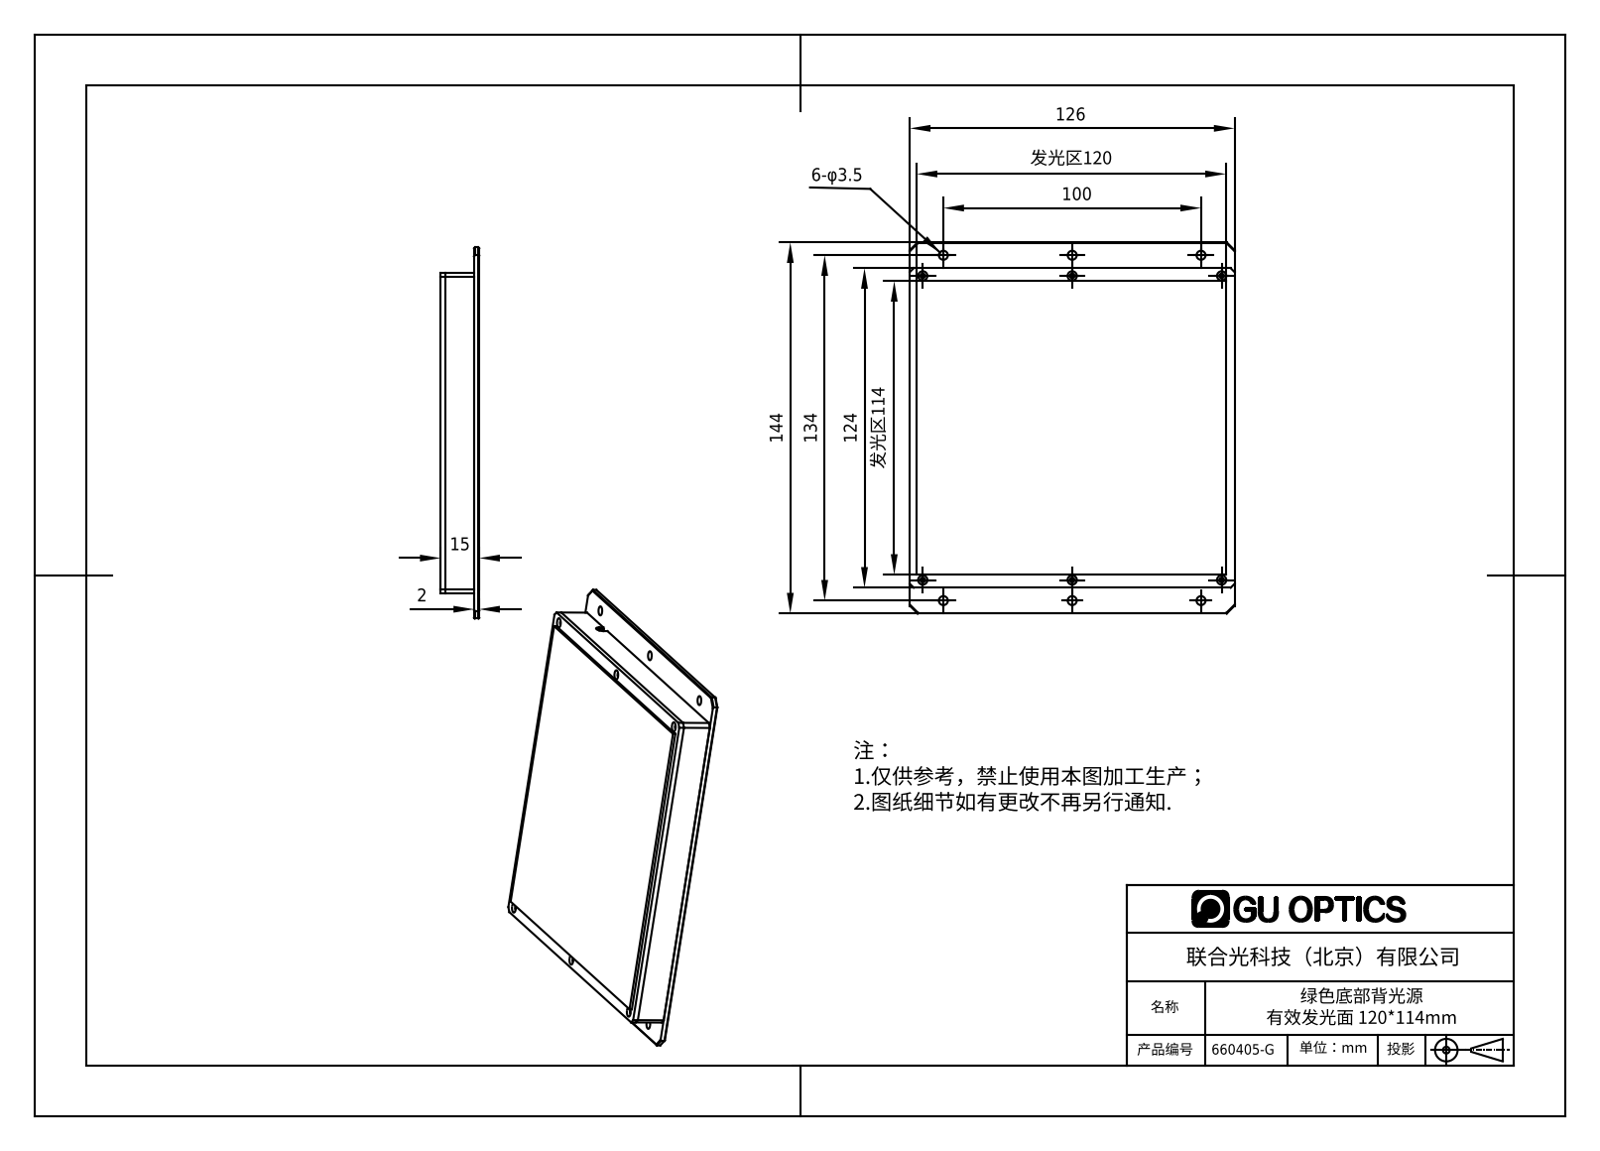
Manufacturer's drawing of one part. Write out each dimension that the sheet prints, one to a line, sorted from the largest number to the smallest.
144
134
126
124
发光区120
发光区114
100
15
2
